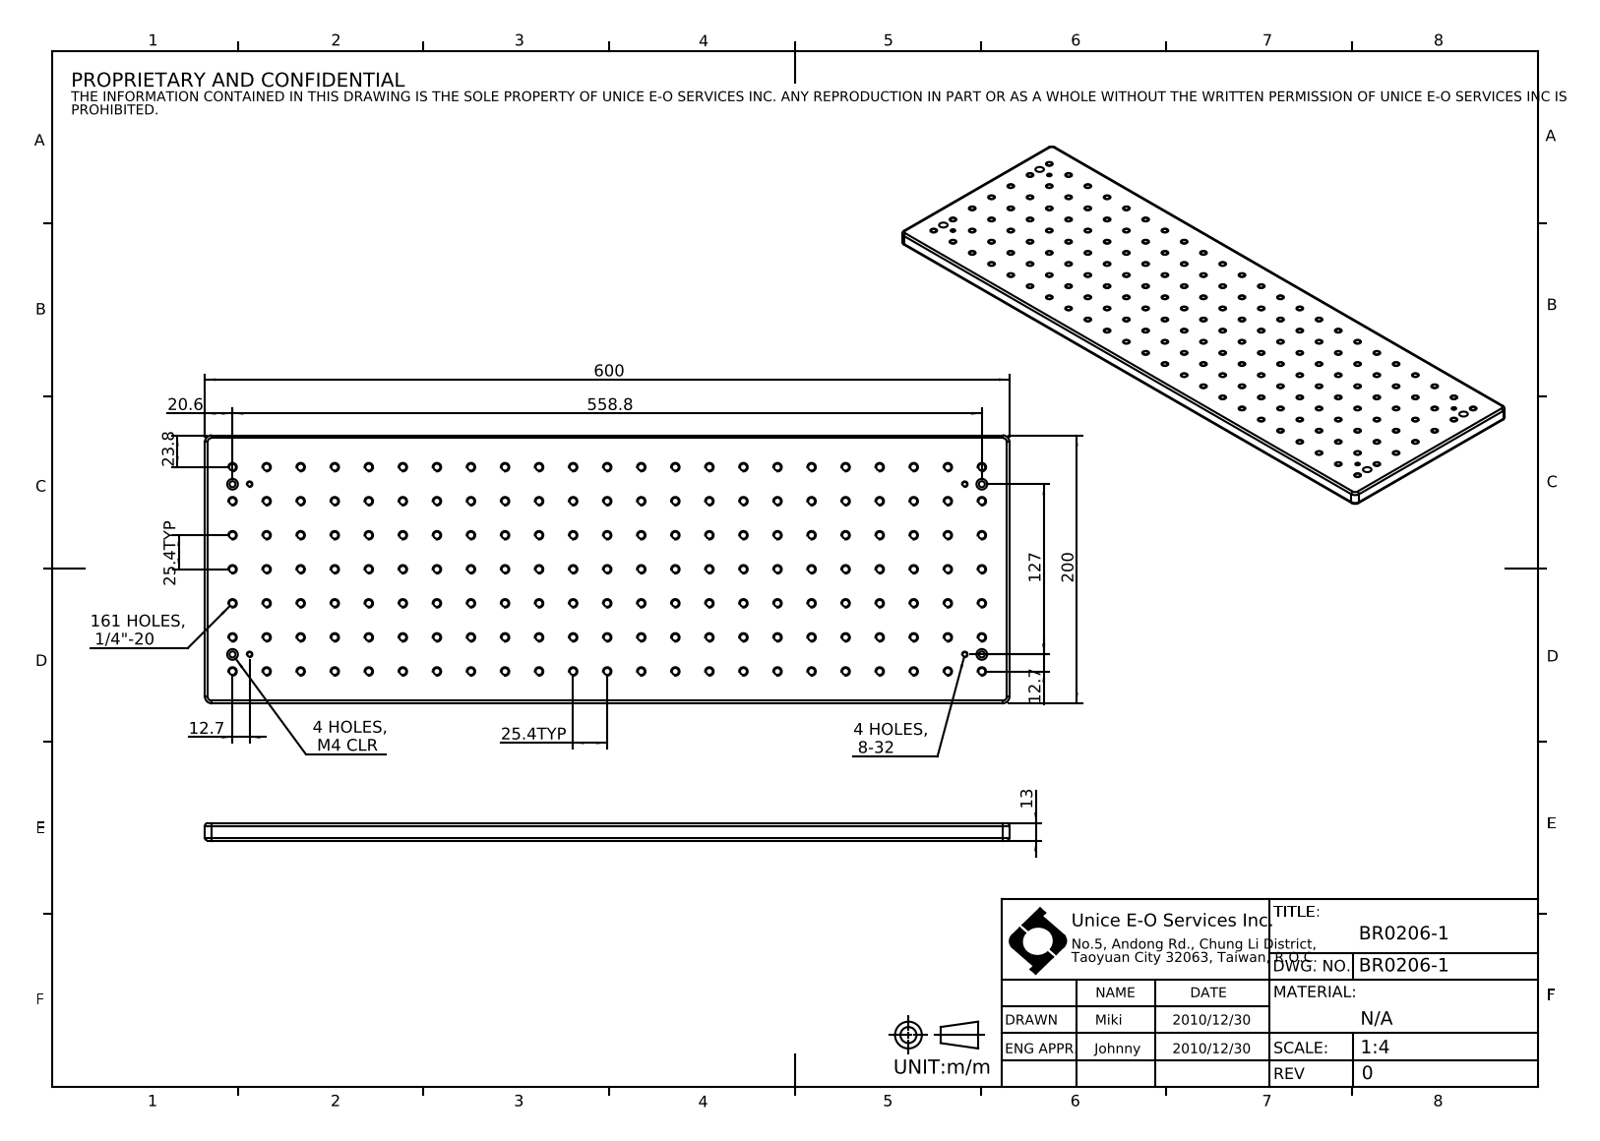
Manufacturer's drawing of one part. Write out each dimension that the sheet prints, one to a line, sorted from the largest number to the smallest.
600
558.8
200
161 HOLES, 1/4"-20
127
25.4 TYP
25.4 TYP
23.8
20.6
13
12.7
12.7
4 HOLES, 8-32
4 HOLES, M4 CLR
